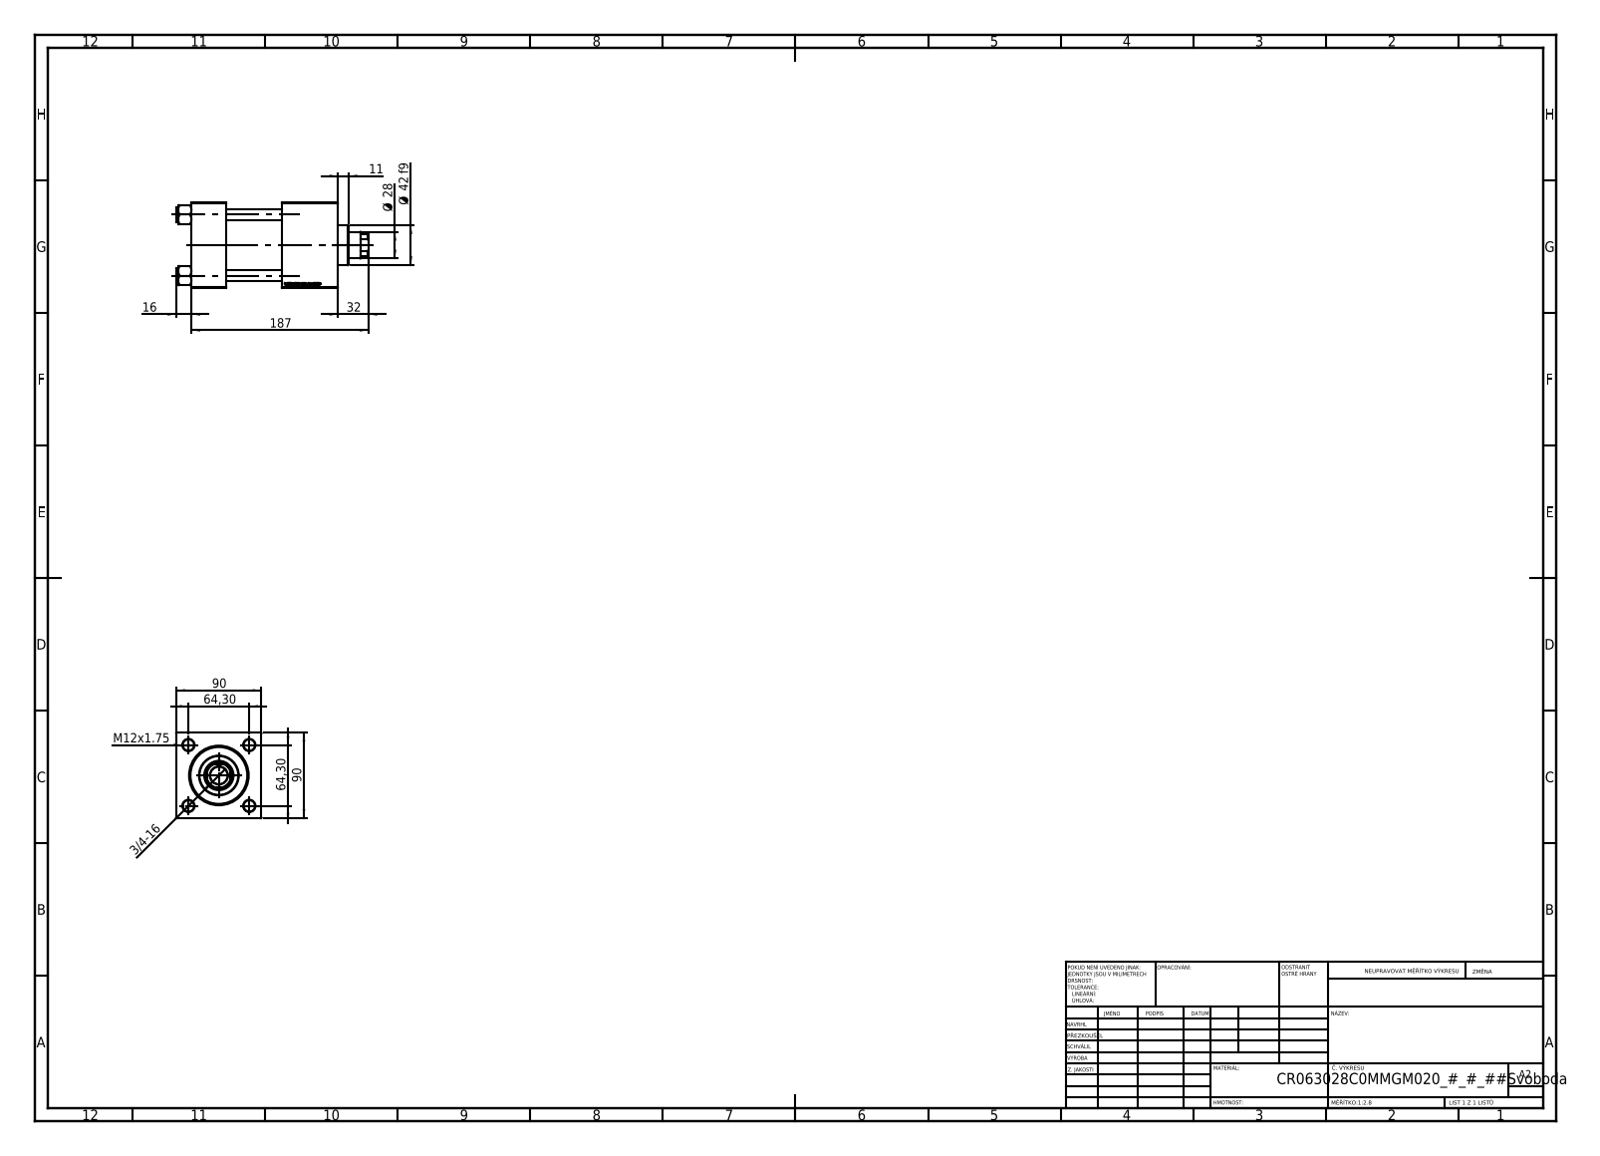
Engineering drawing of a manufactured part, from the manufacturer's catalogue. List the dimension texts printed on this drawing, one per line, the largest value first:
187
90
90
64,30
64,30
Ø 42 f9
32
Ø 28
16
M12x1.75
11
3/4-16
